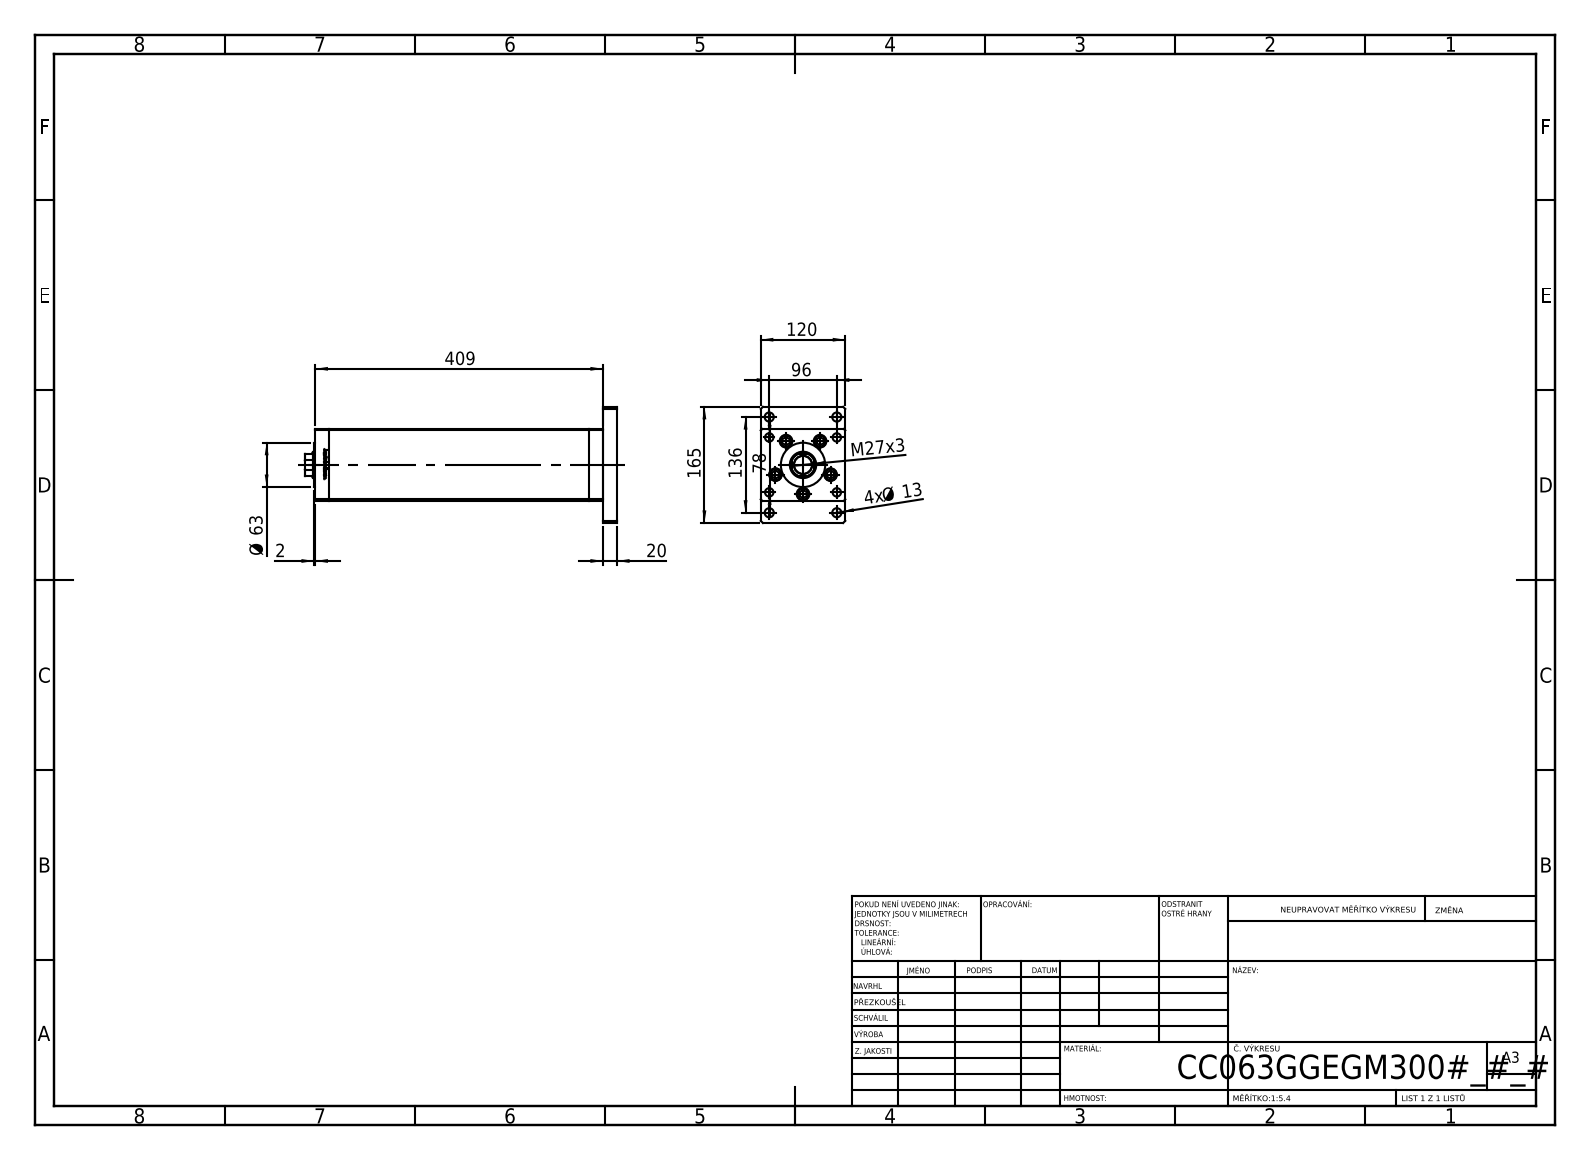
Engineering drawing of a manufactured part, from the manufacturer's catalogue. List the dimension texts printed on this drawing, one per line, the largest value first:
409
165
136
120
96
78
Ø 63
M27x3
20
4x Ø 13
2
